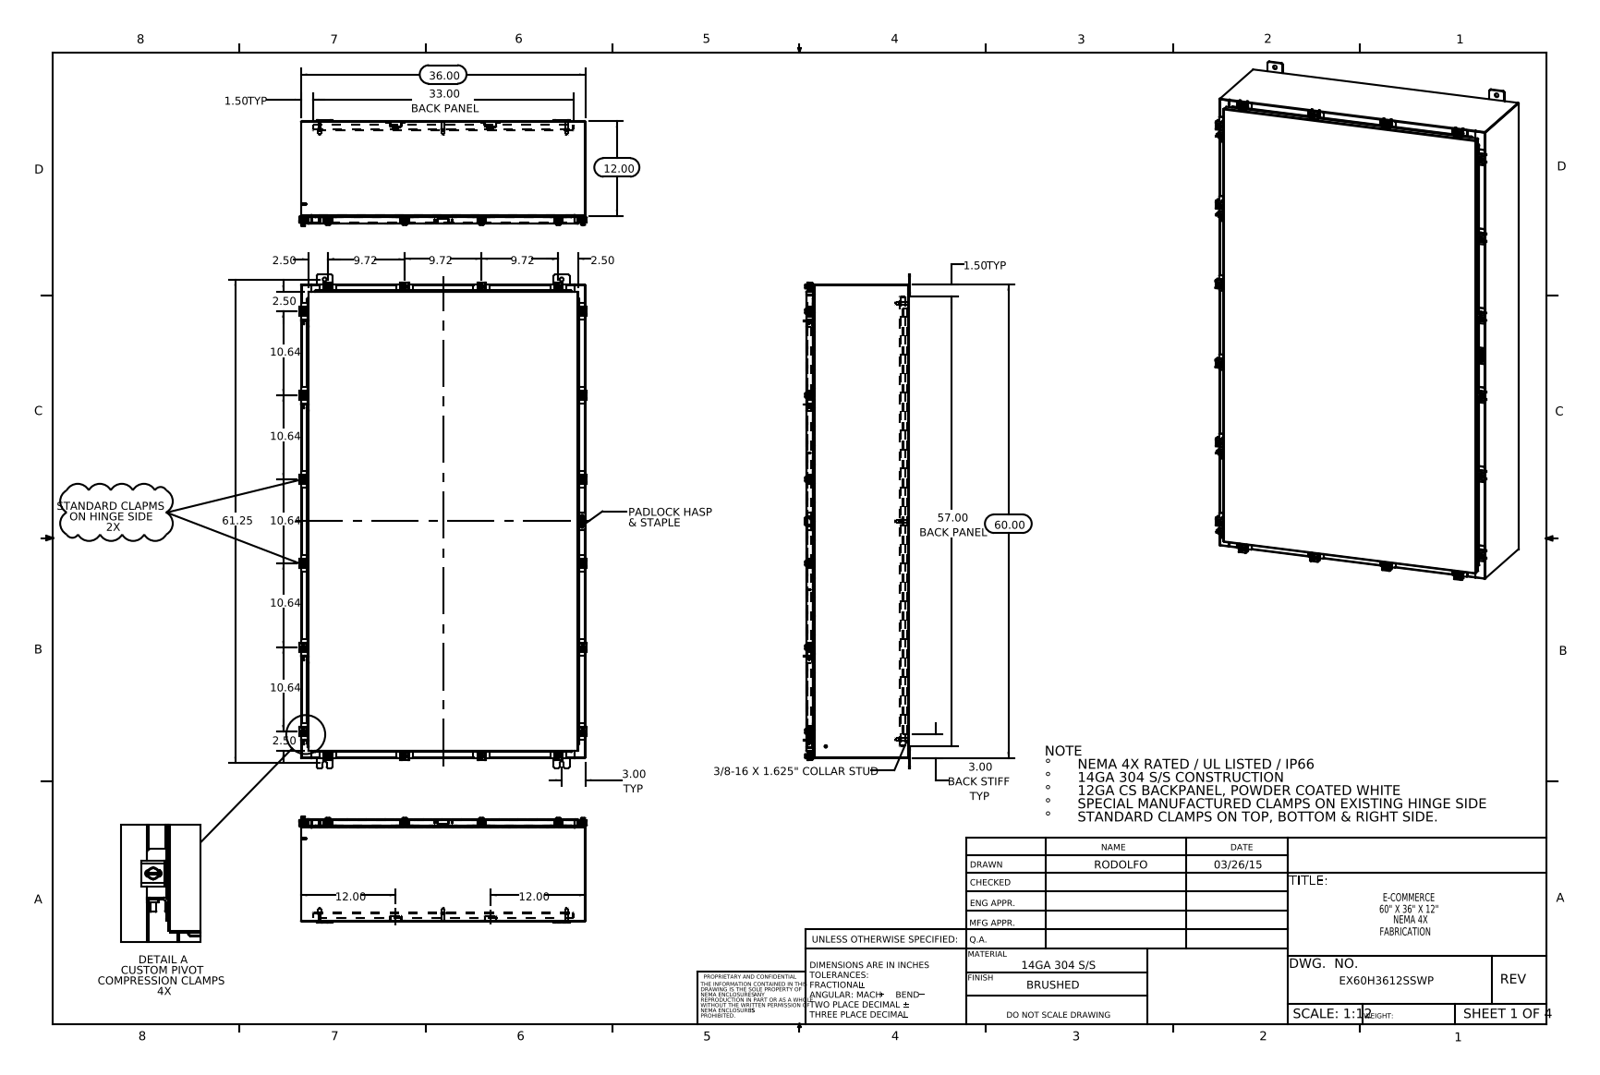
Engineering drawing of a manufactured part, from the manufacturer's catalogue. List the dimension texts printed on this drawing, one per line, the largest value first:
61.25
60.00
57.00 BACK PANEL
36.00
33.00 BACK PANEL
12.00
12.00
12.00
10.64
10.64
10.64
10.64
10.64
9.72
9.72
9.72
3.00 TYP
3.00 BACK STIFF TYP
2.50
2.50
2.50
2.50
1.50 TYP
1.50 TYP
